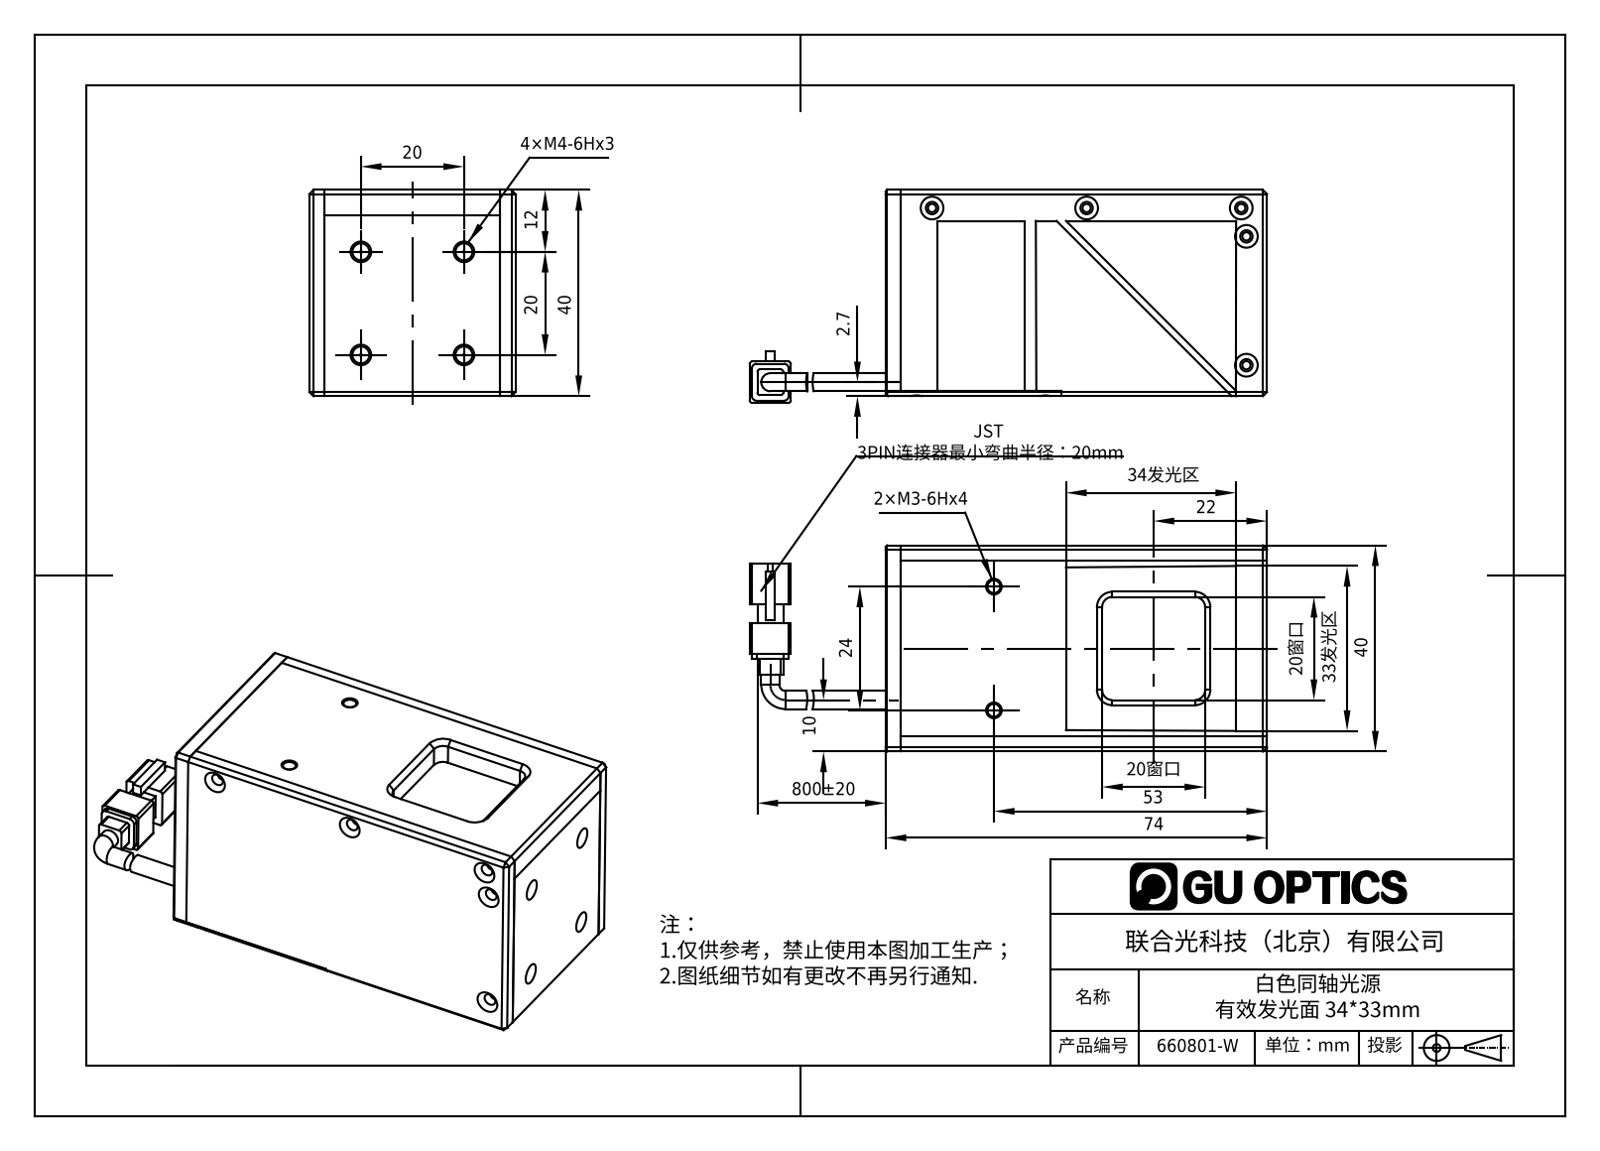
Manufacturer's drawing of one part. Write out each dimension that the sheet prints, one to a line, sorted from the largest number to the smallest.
800±20
74
53
40
40
34发光区
33发光区
24
22
20窗口
20窗口
20
20
12
10
2.7
